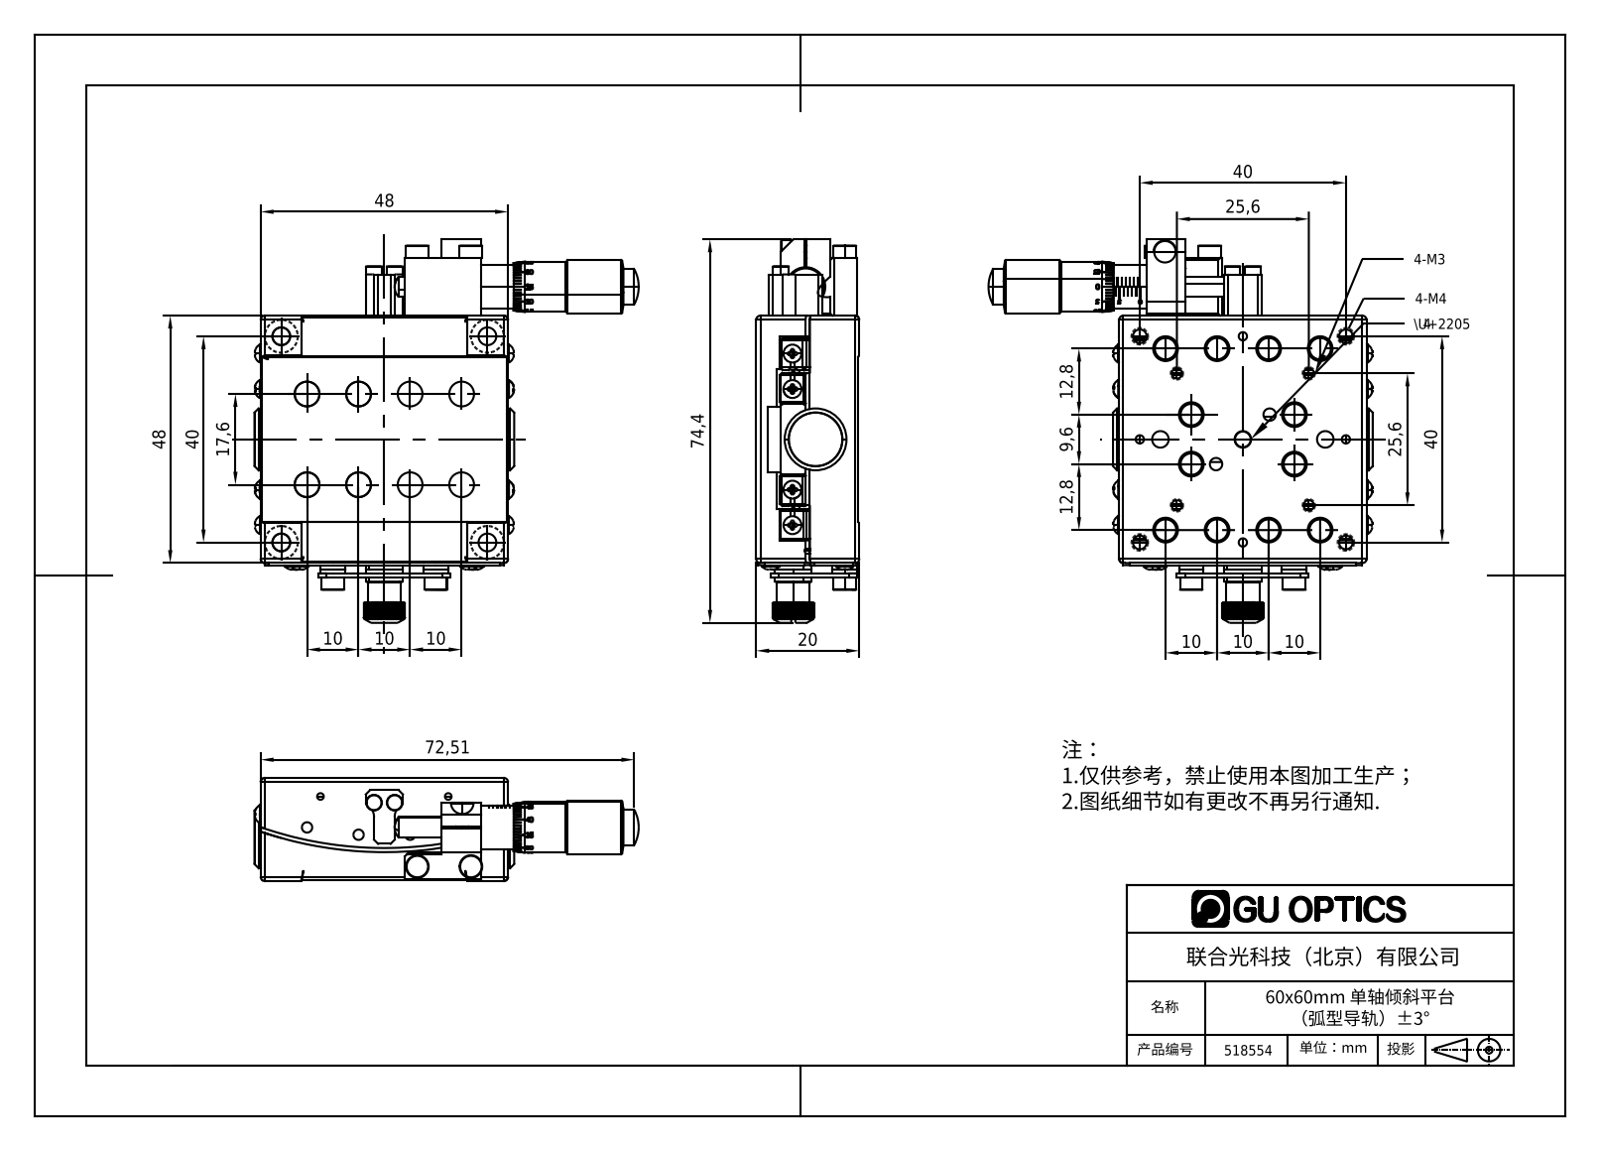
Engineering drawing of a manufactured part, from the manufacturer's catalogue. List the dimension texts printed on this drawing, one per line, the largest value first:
74,4
72,51
48
48
40
40
40
25,6
25,6
20
17,6
12,8
12,8
10
10
10
10
10
10
9,6
